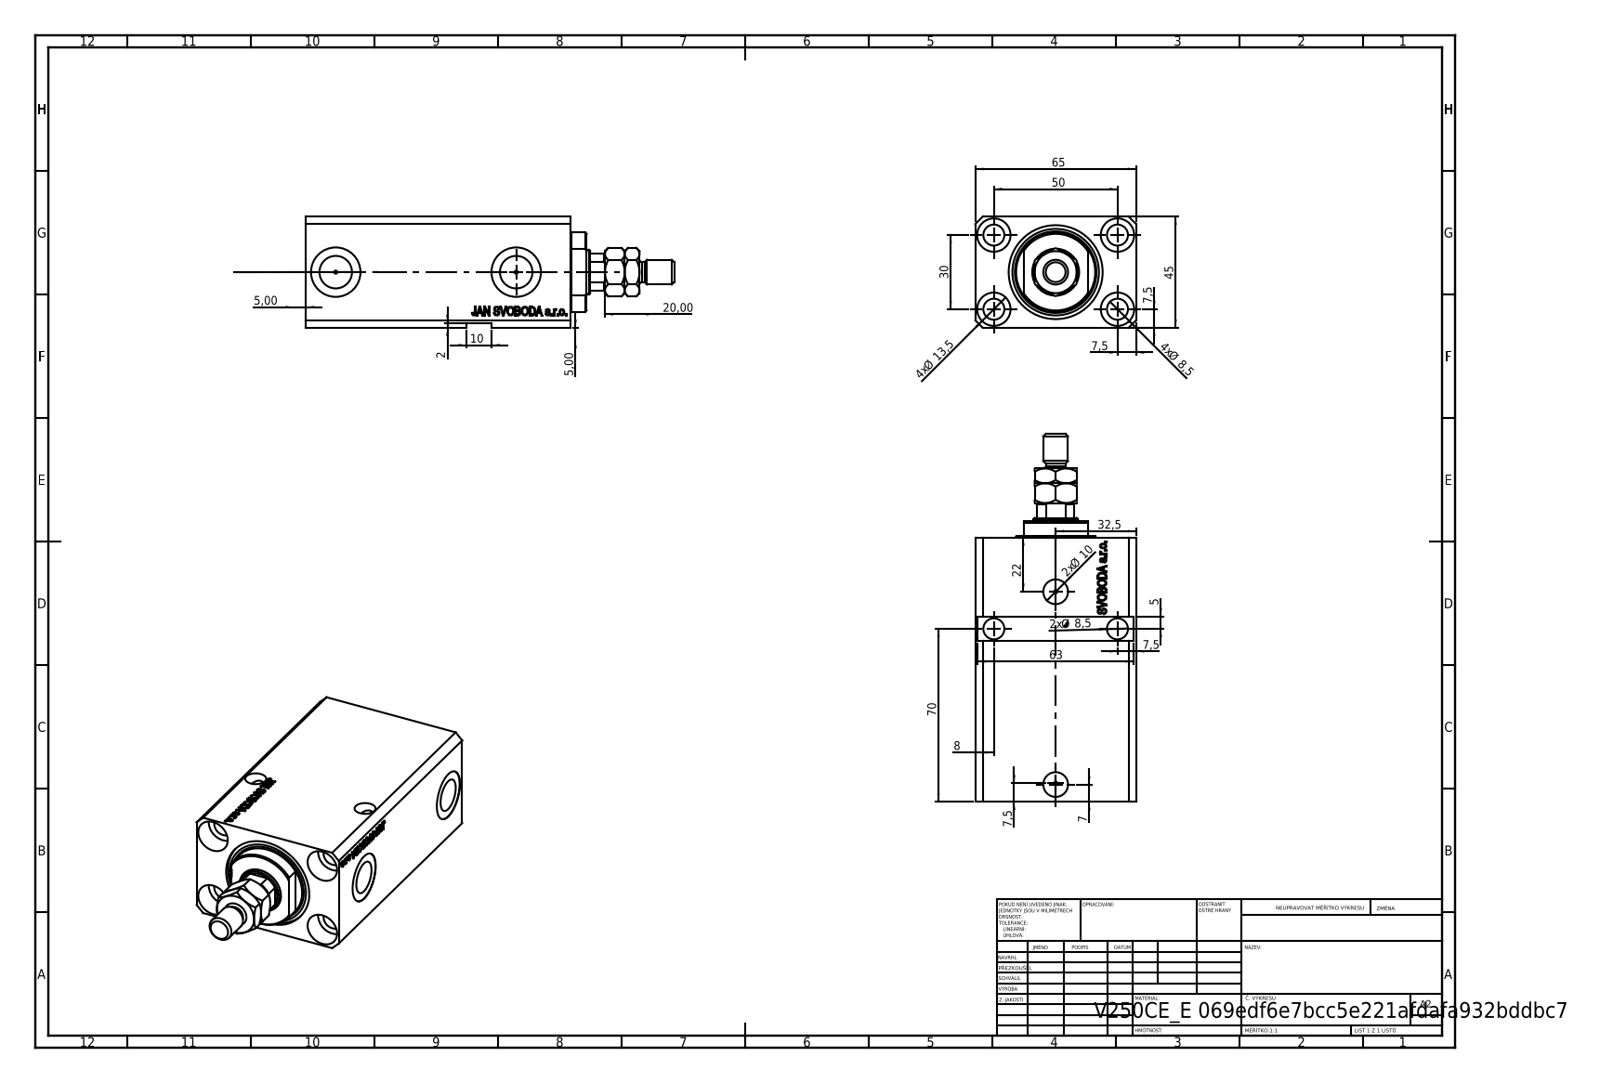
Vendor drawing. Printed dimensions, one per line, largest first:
70
65
63
50
45
32,5
30
22
20,00
4x Ø 13,5
10
2x Ø 10
4x Ø 8,5
2x Ø 8,5
8
7,5
7,5
7,5
7,5
7
5,00
5,00
5
2
